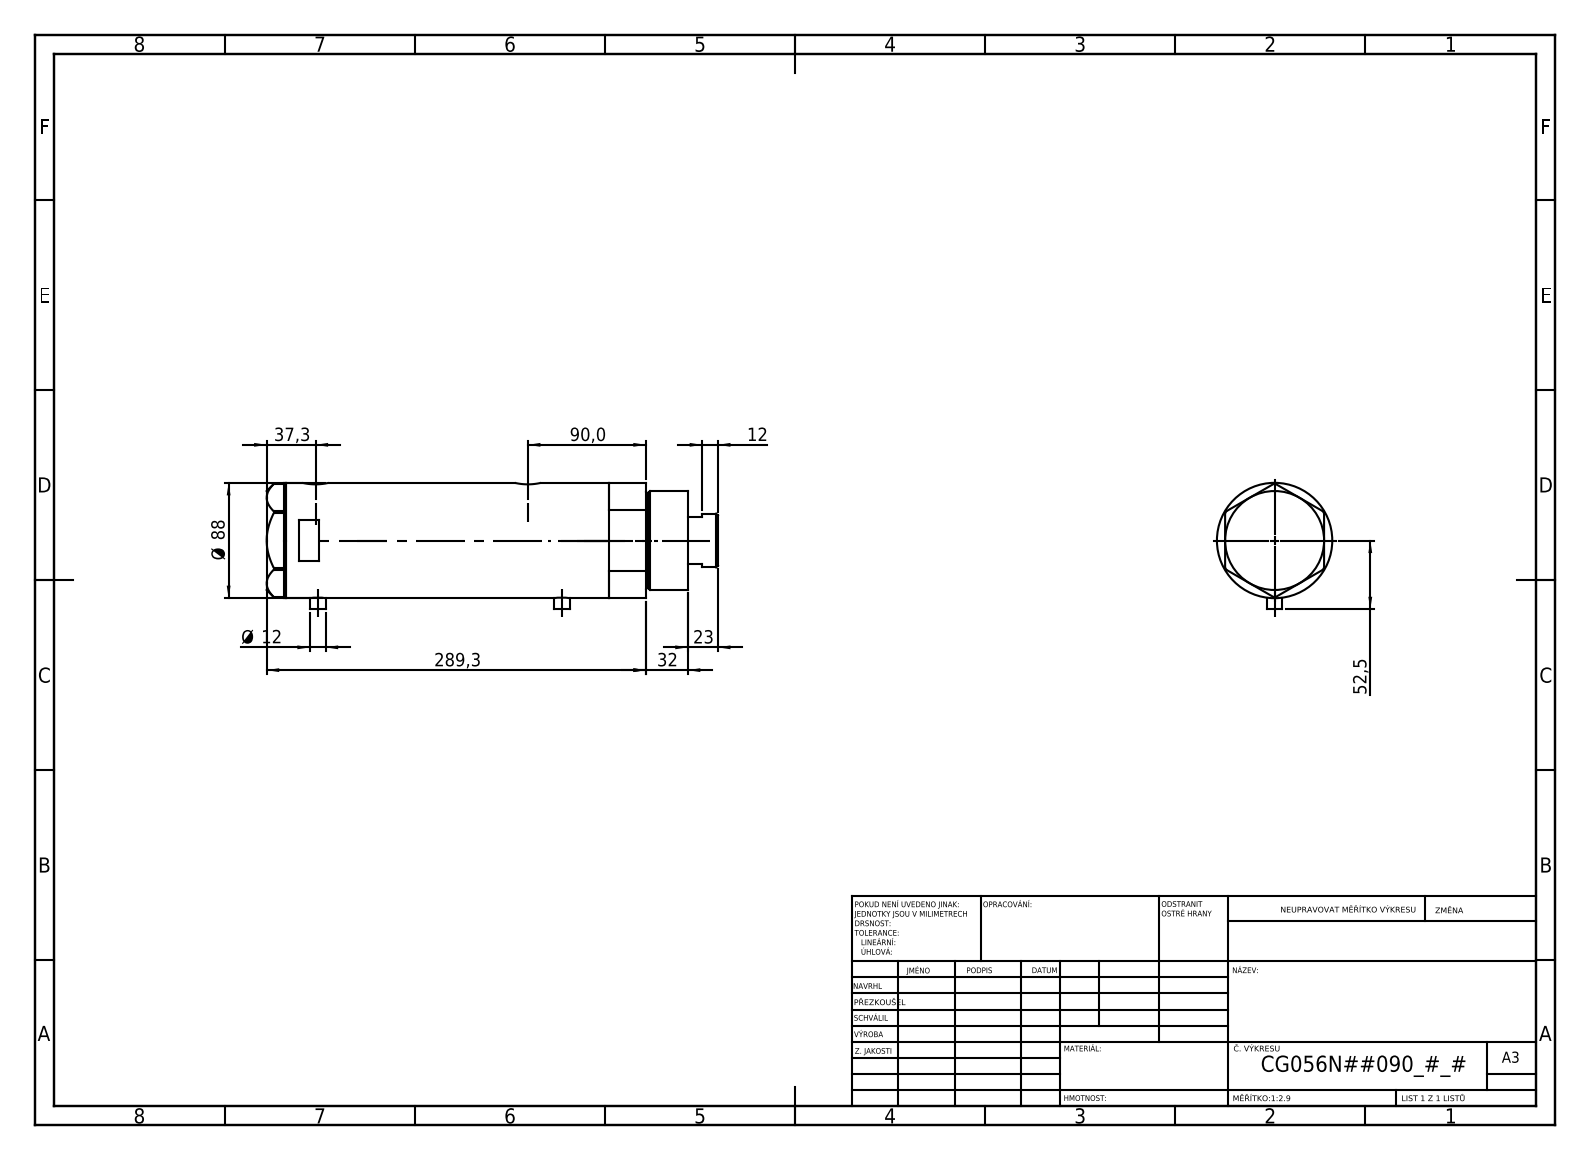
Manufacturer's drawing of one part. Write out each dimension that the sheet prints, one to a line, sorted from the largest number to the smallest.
289,3
90,0
Ø 88
52,5
37,3
32
23
12
Ø 12
